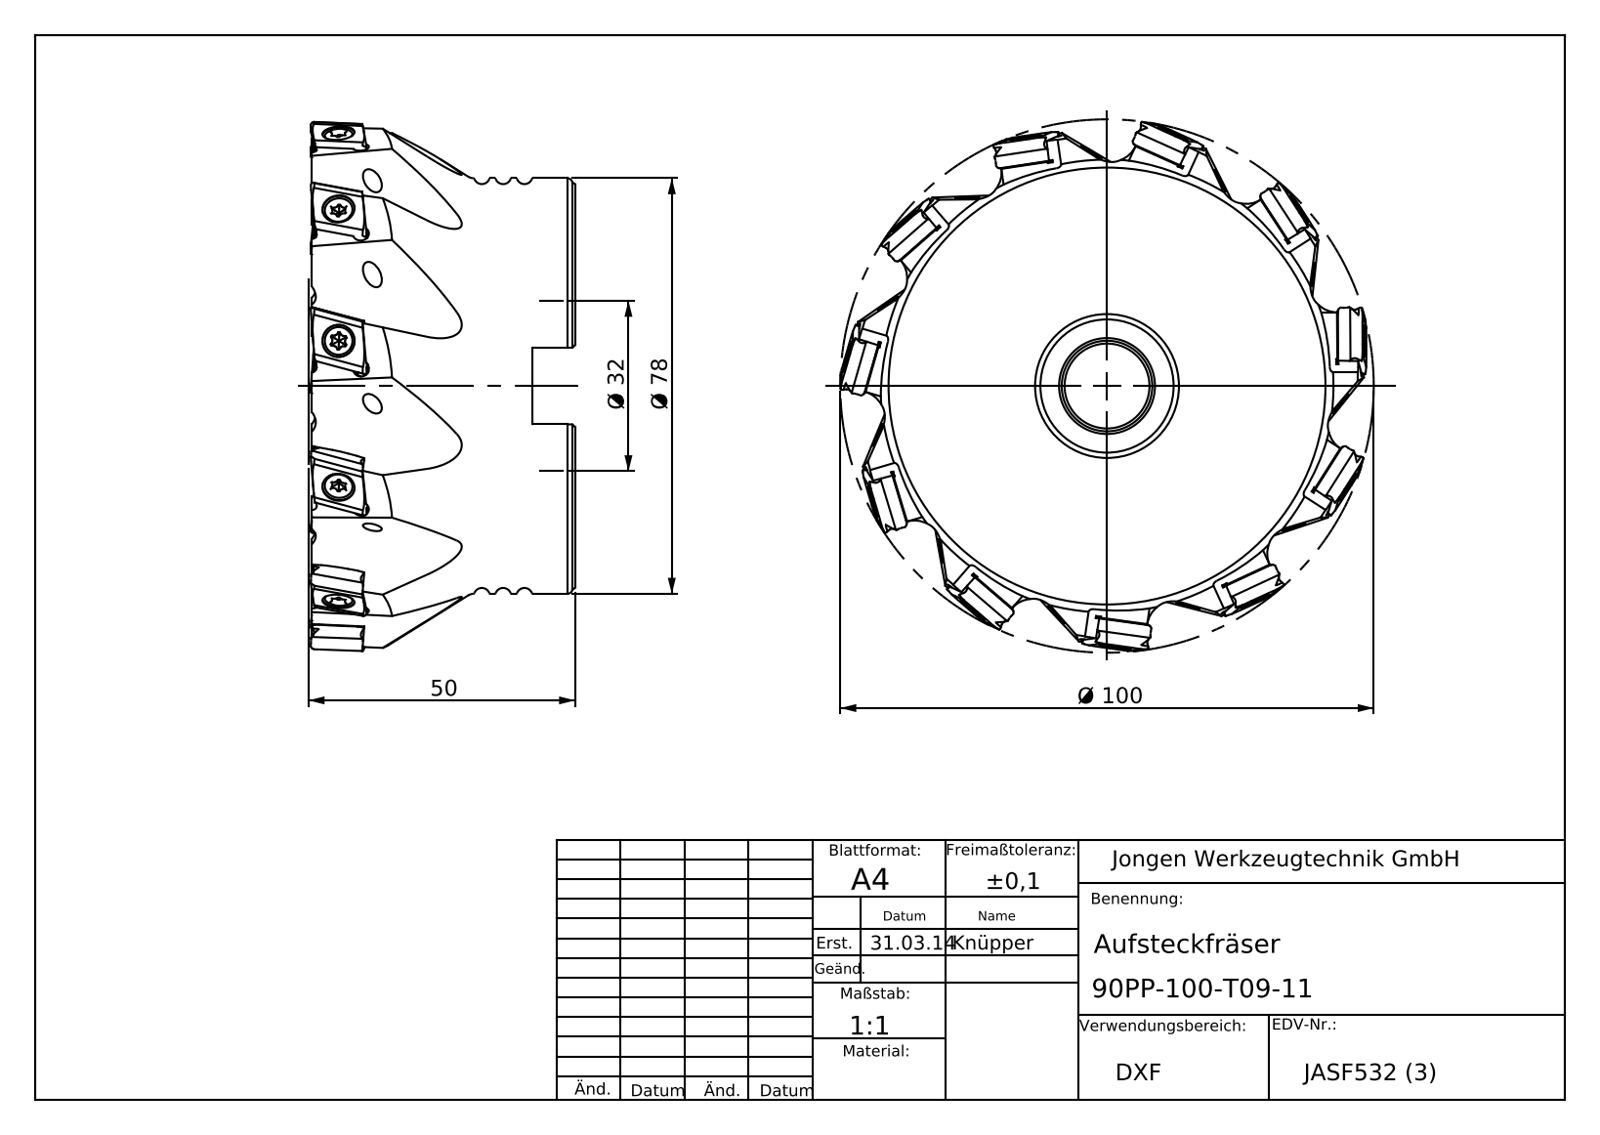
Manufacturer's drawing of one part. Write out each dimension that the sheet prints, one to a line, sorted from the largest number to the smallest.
Ø 100
Ø 78
50
Ø 32
